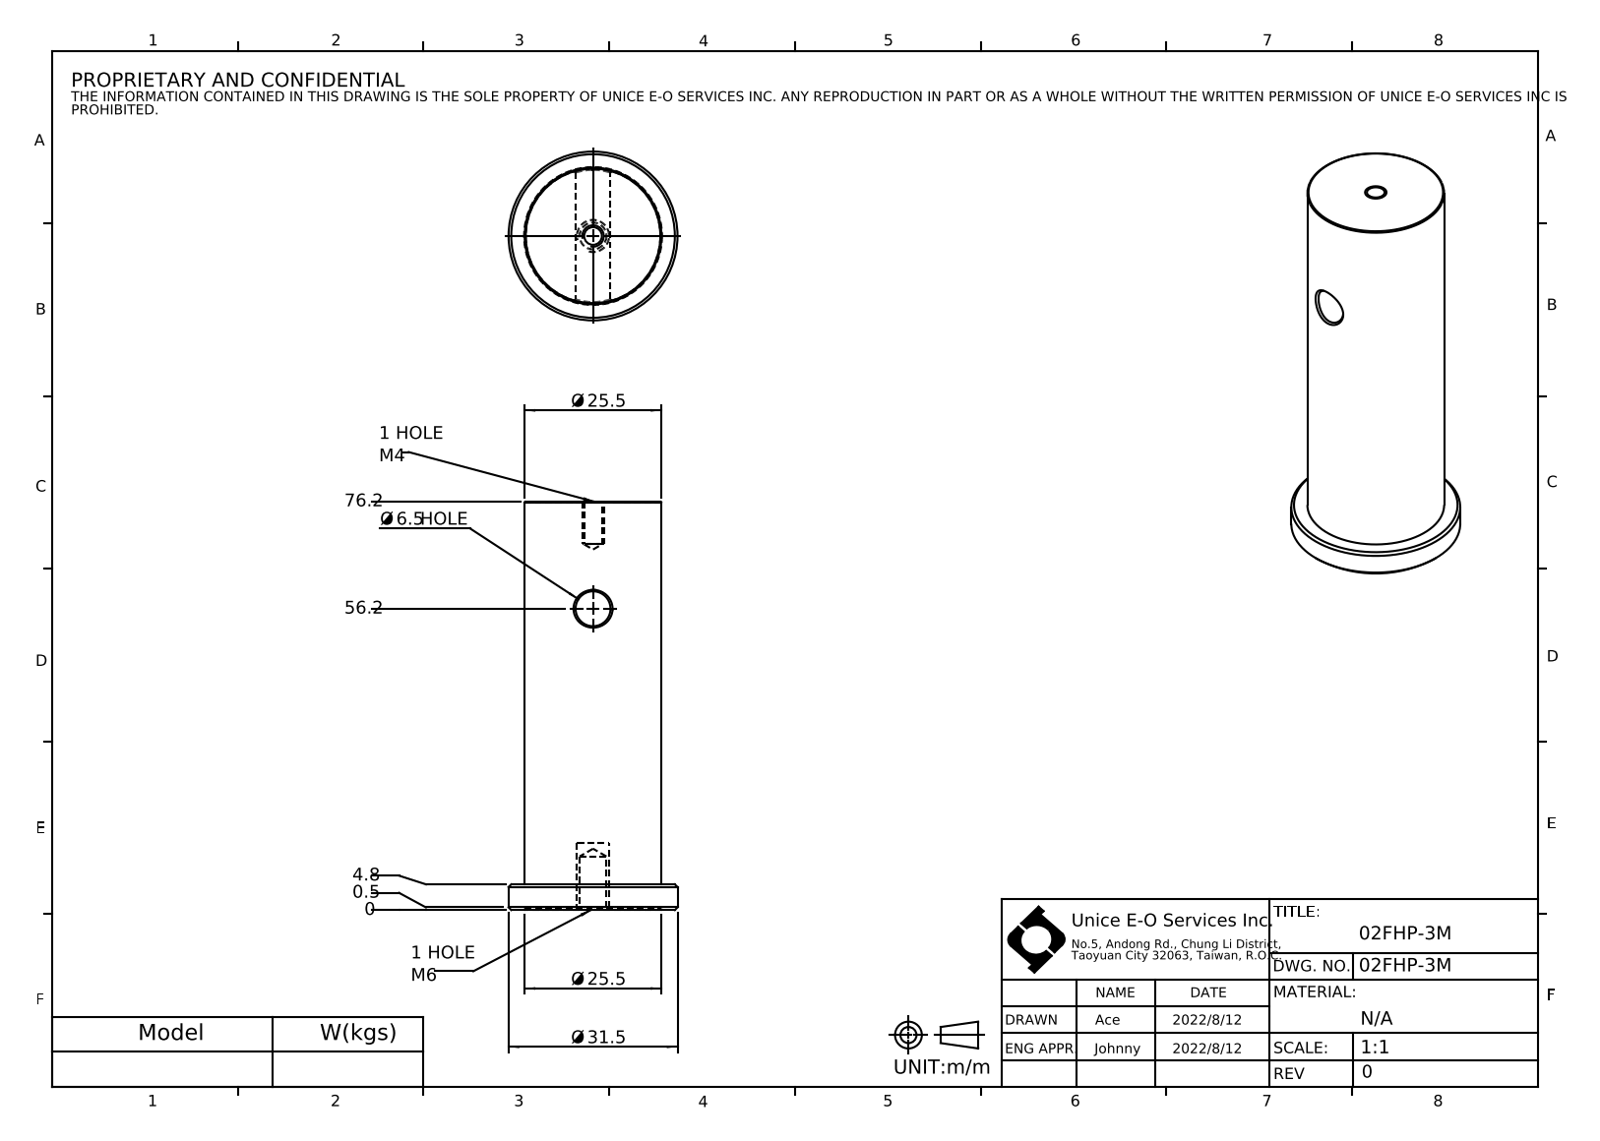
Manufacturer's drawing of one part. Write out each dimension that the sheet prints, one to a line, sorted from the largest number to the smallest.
76.2
56.2
Ø 31.5
Ø 25.5
Ø 25.5
Ø 6.5 HOLE
4.8
0.5
0
